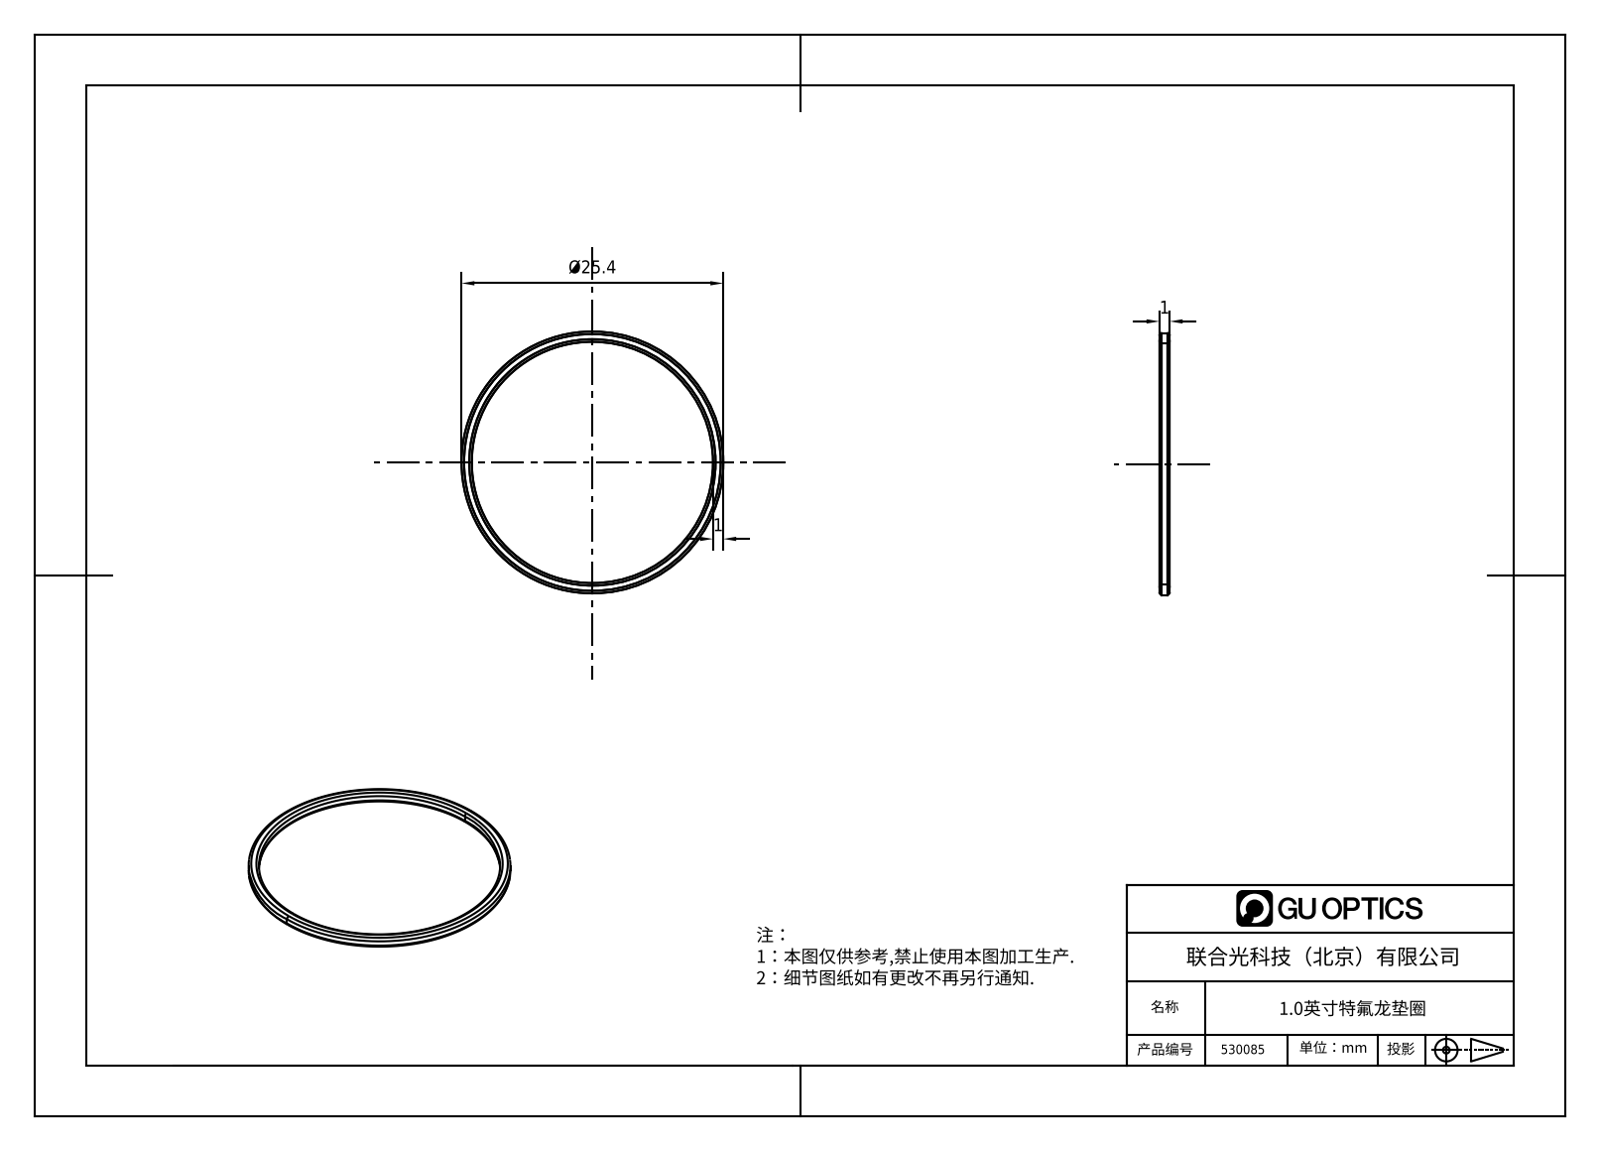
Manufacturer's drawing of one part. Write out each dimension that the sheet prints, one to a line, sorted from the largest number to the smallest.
Ø25.4
1
1
